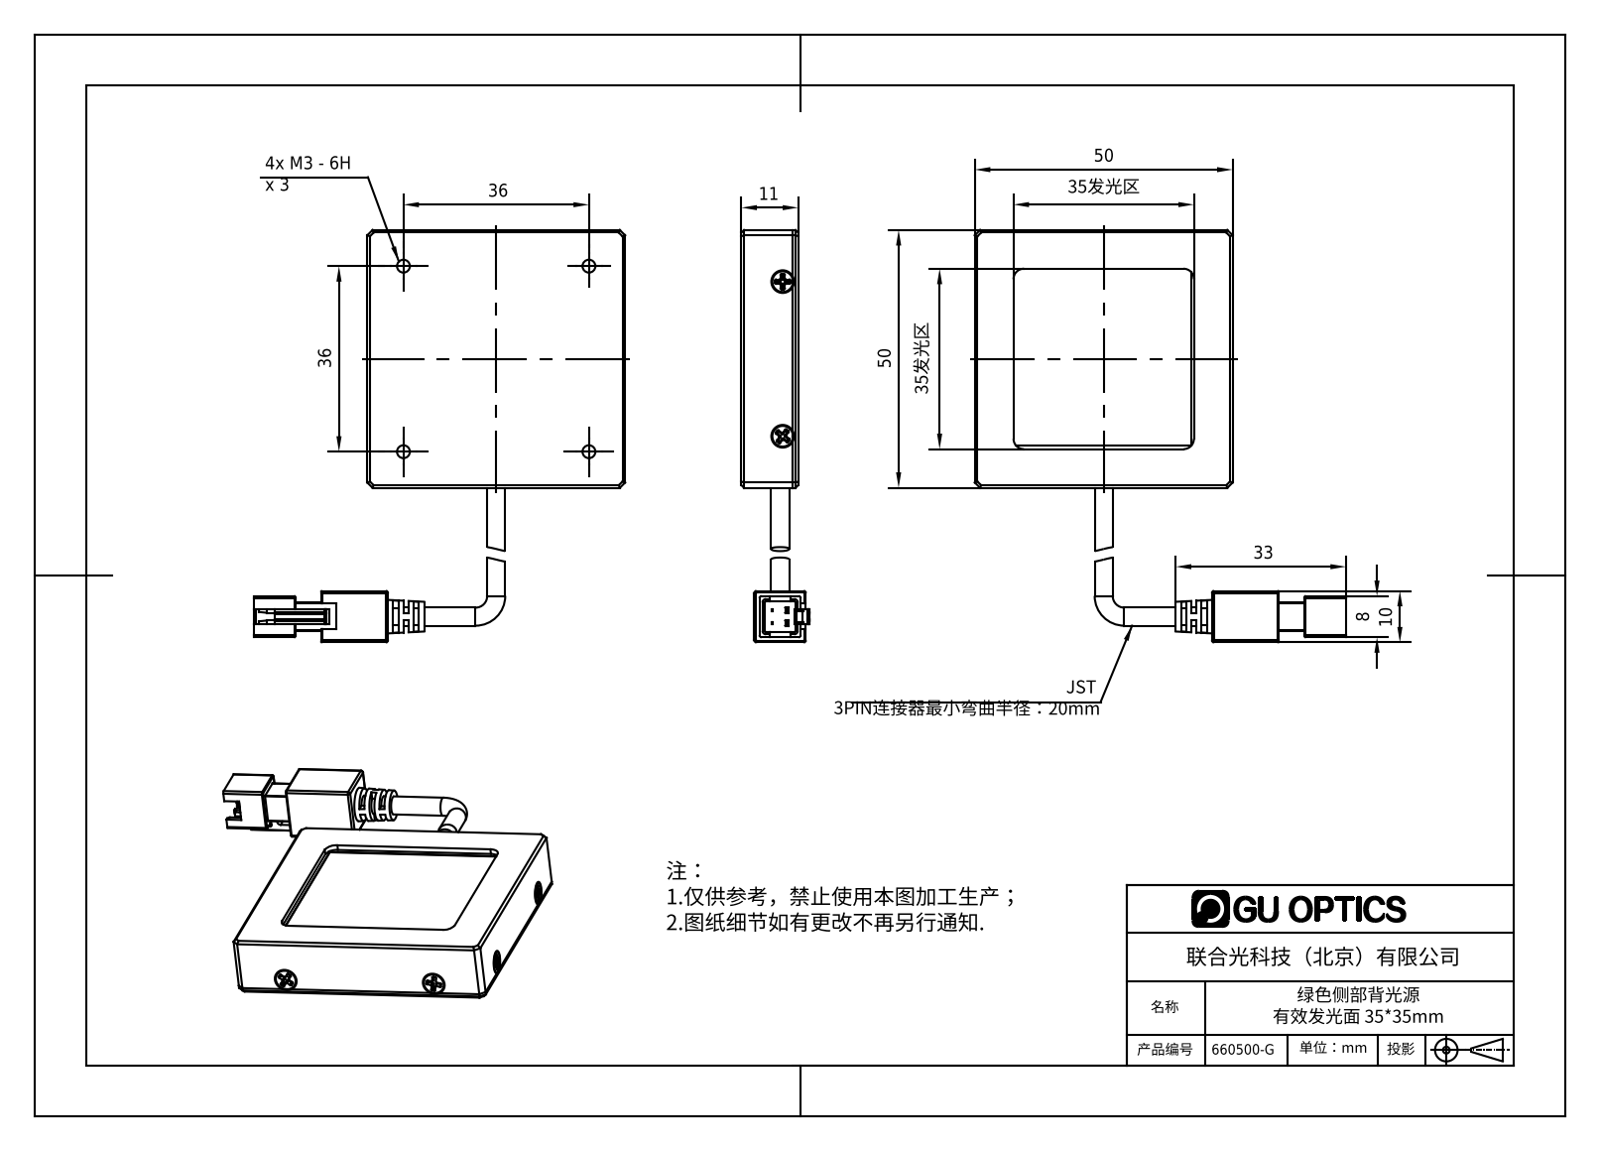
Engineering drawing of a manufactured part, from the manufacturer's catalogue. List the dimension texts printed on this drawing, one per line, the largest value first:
50
50
36
36
35发光区
35发光区
33
11
10
8
